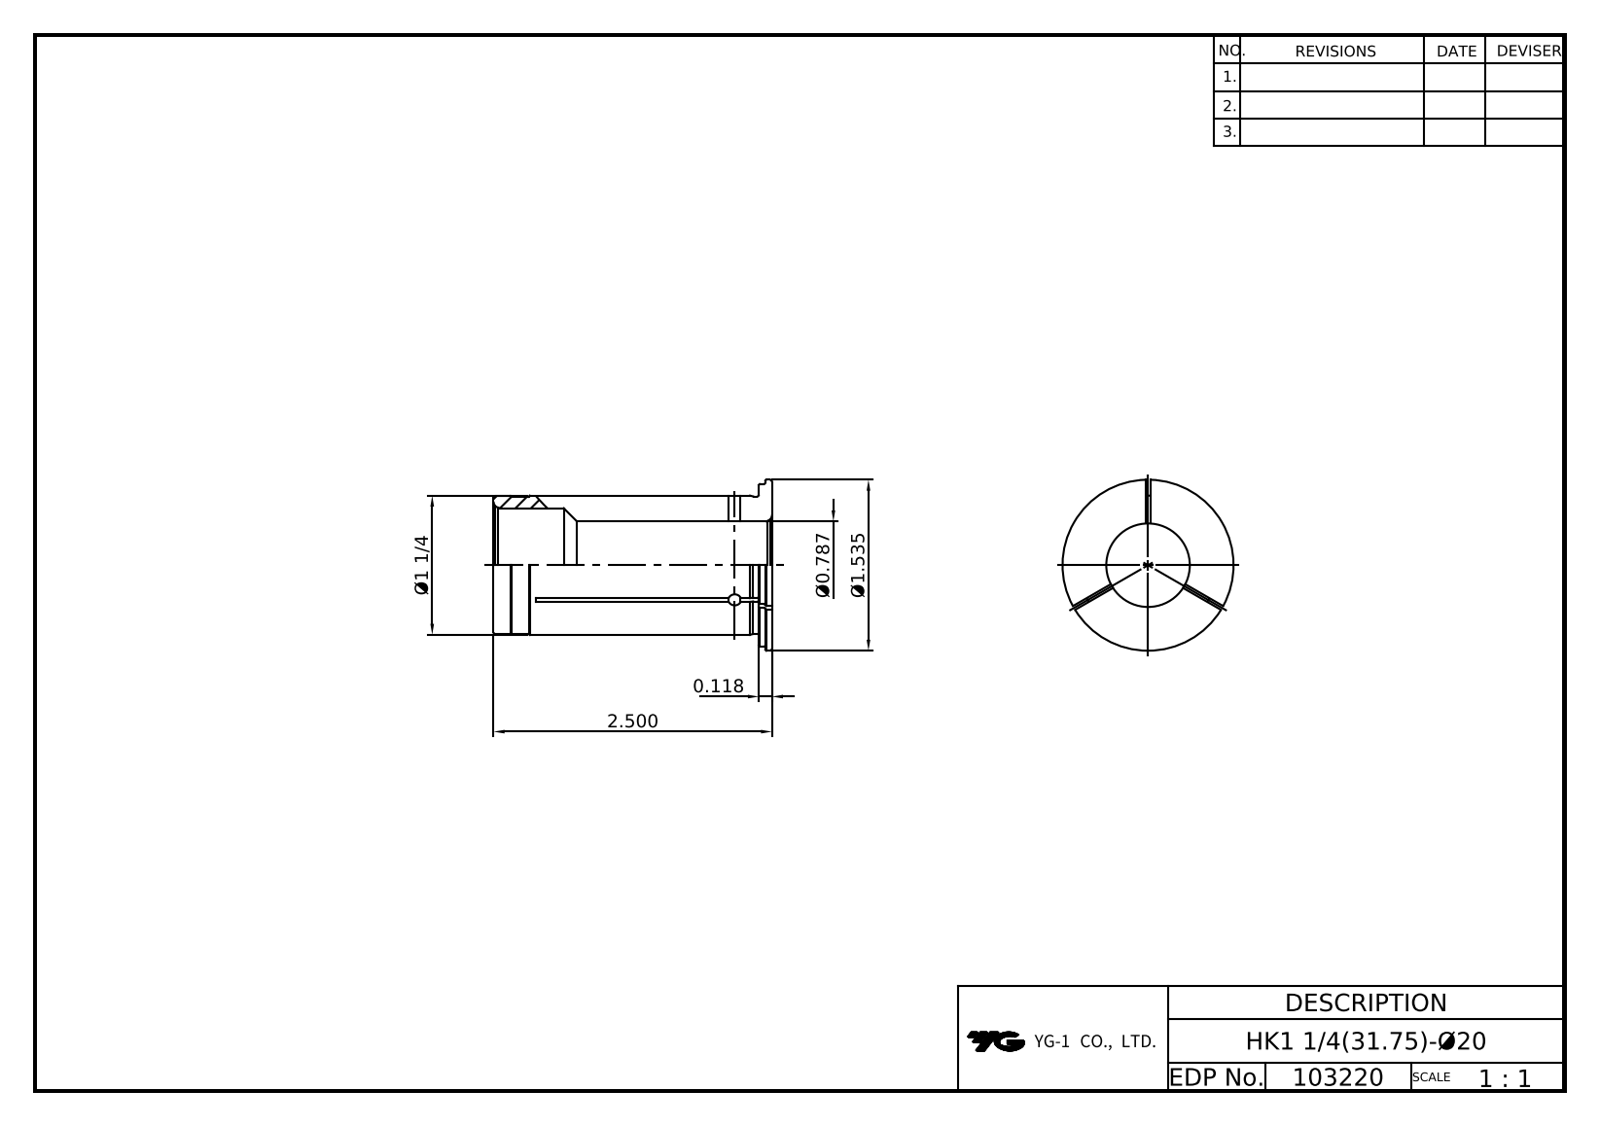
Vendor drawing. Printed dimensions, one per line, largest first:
2.500
Ø1.535
Ø1 1/4
0.118
